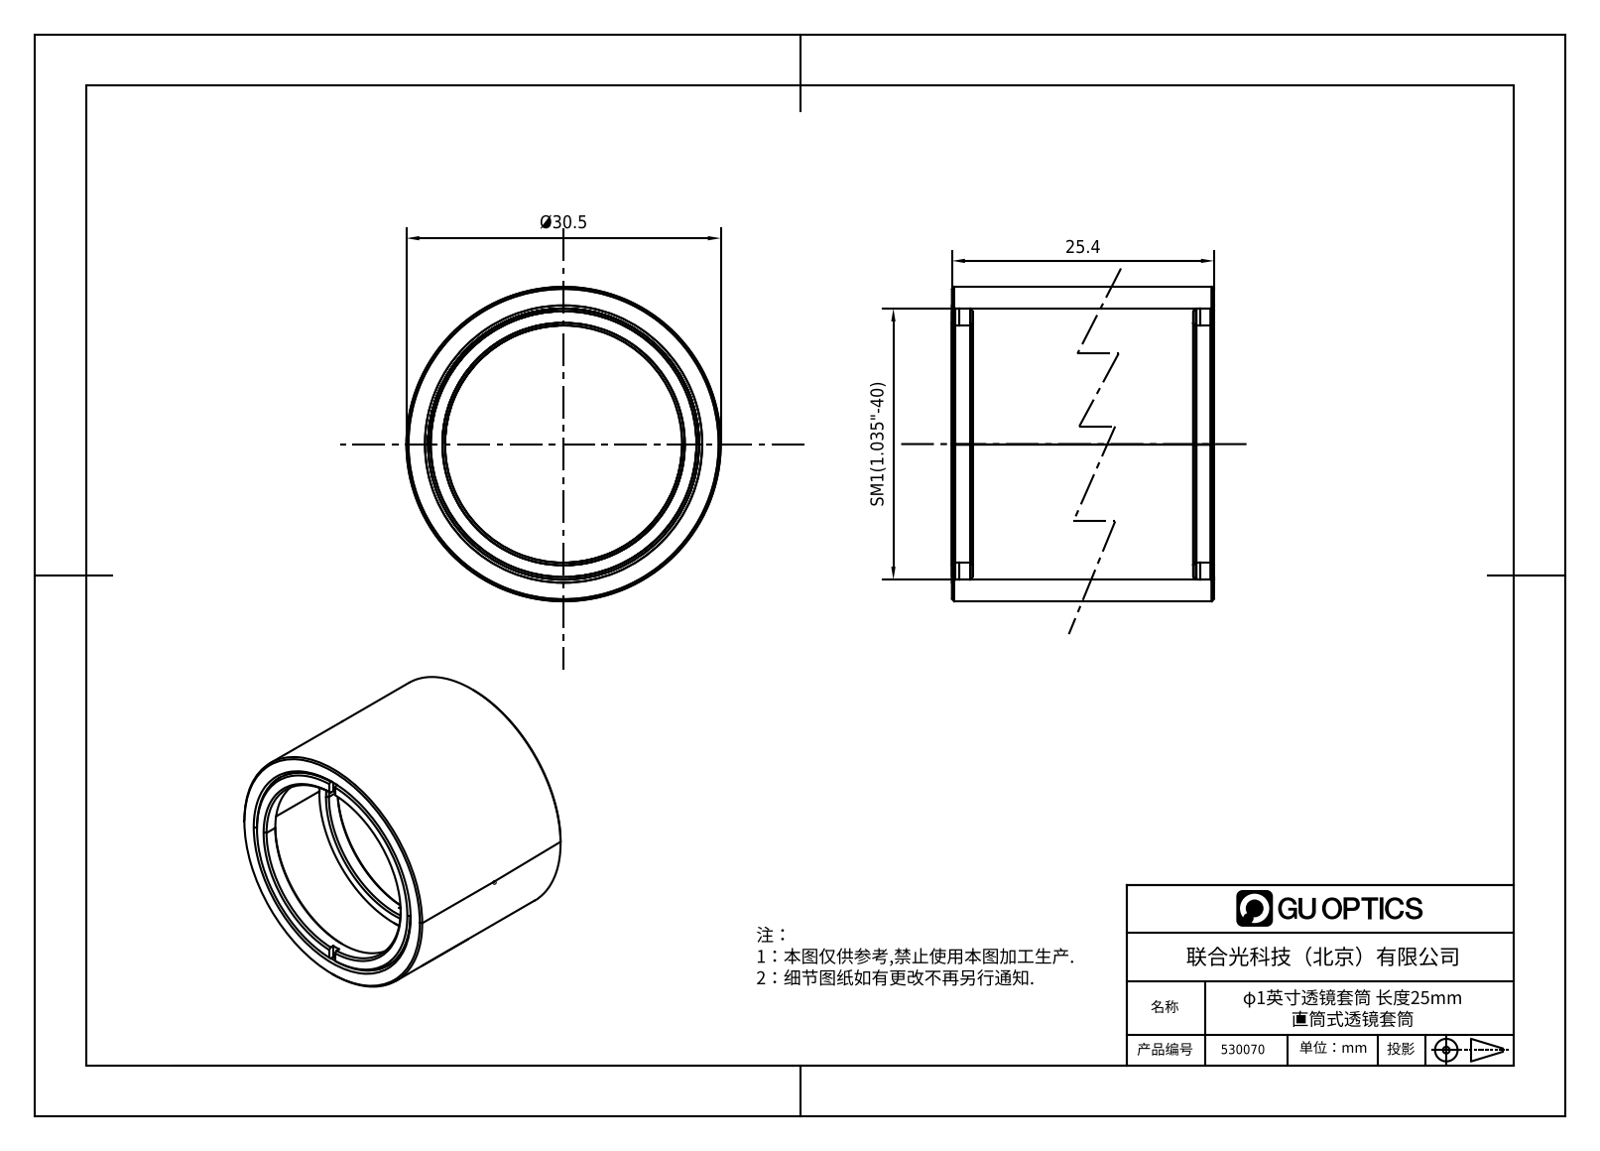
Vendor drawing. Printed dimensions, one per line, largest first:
Ø30.5
25.4
SM1(1.035"-40)
